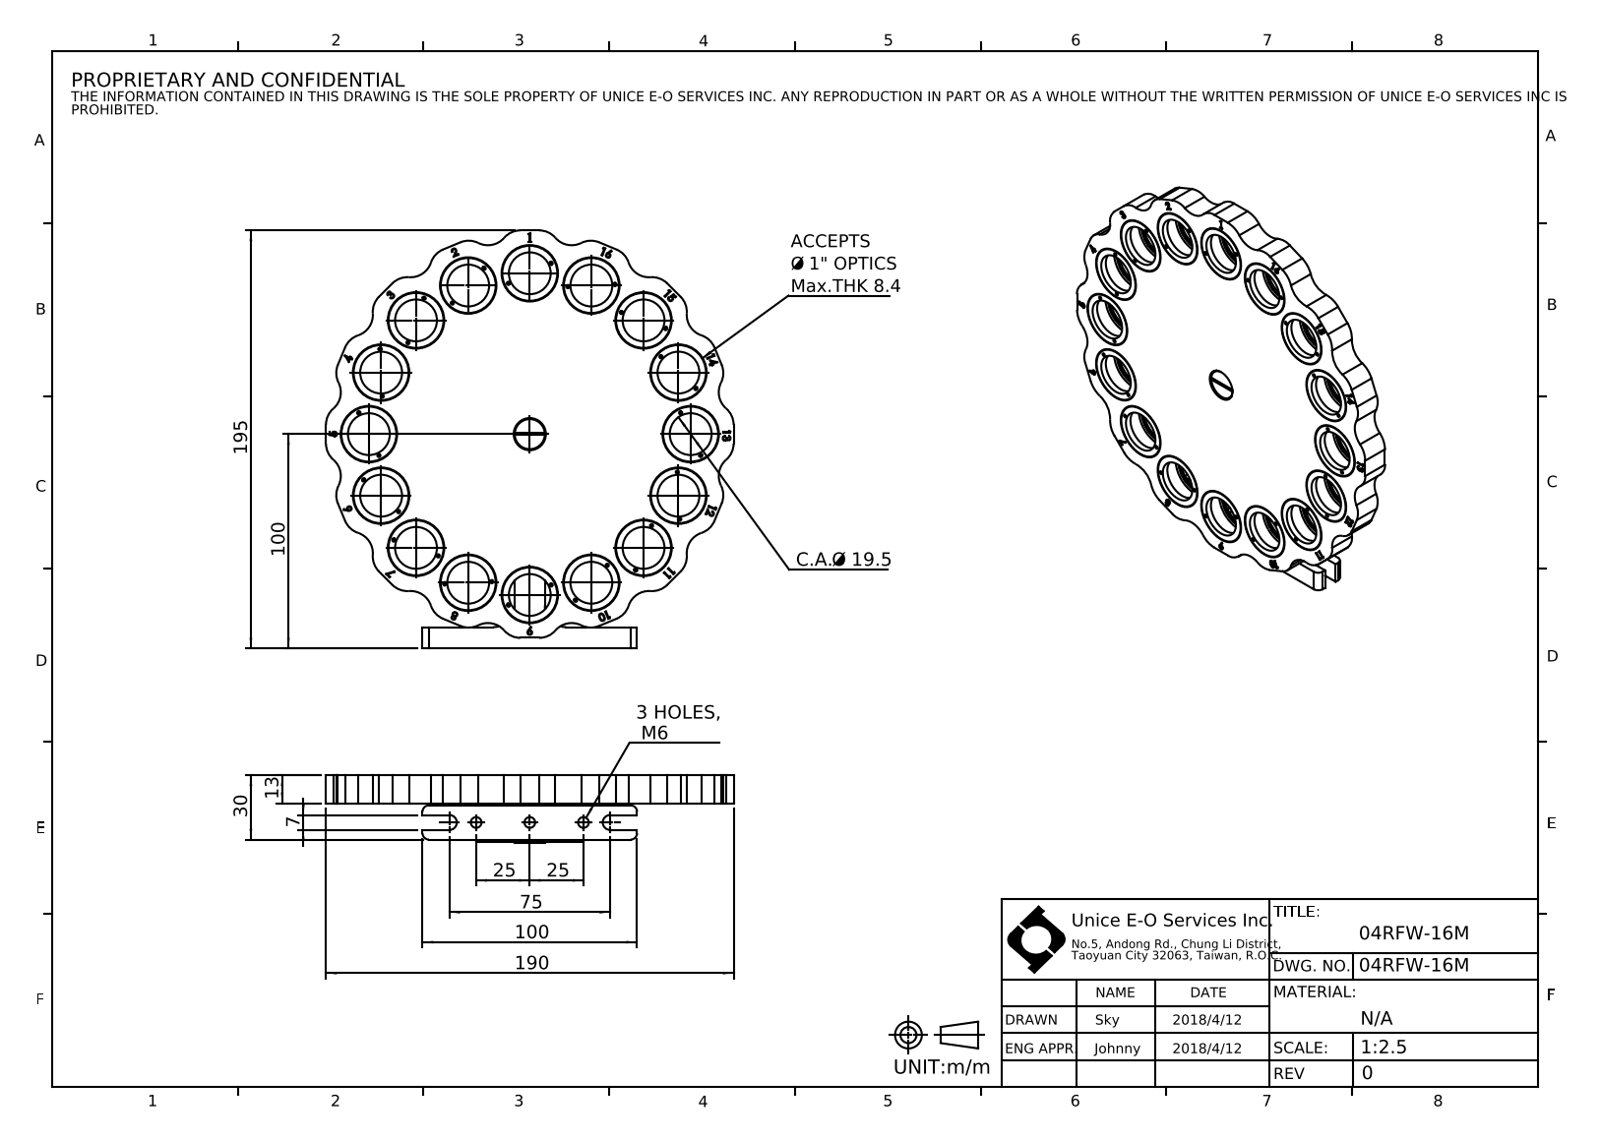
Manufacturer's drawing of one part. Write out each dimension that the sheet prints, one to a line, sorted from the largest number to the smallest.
195
190
100
100
75
30
25
25
C.A. Ø 19.5
13
7
3 HOLES, M6
